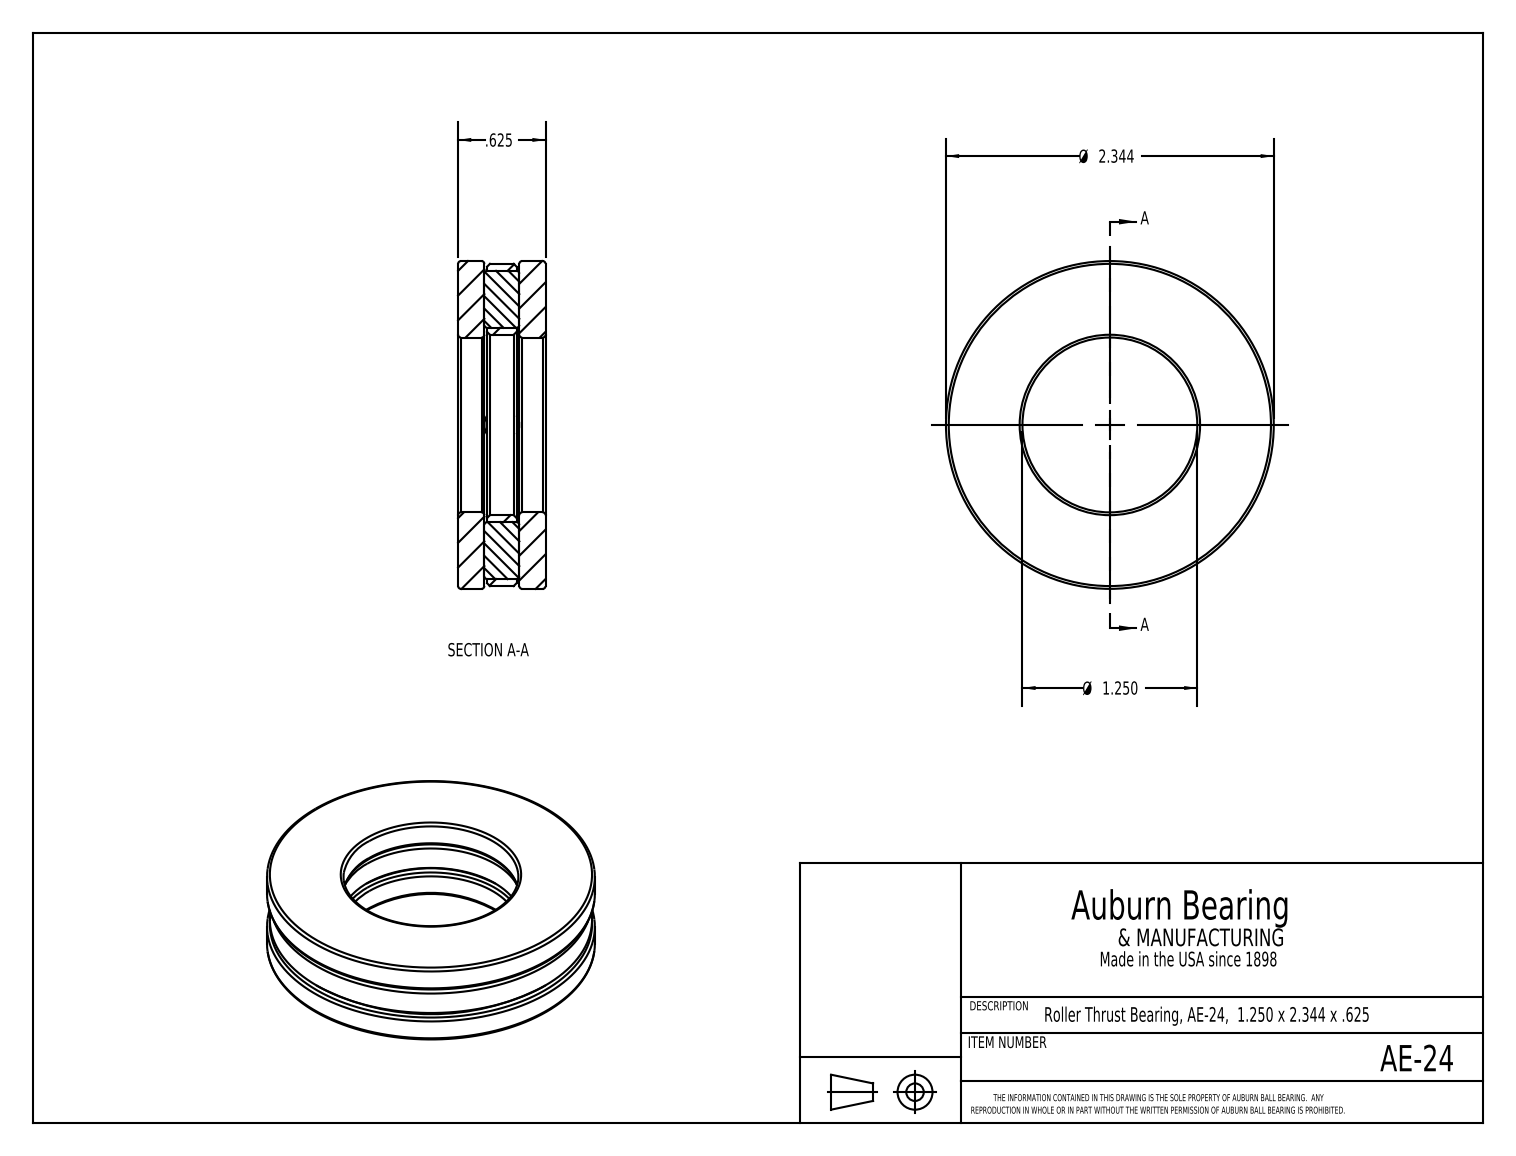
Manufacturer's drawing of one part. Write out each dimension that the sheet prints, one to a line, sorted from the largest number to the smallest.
Ø 2.344
Ø 1.250
.625
